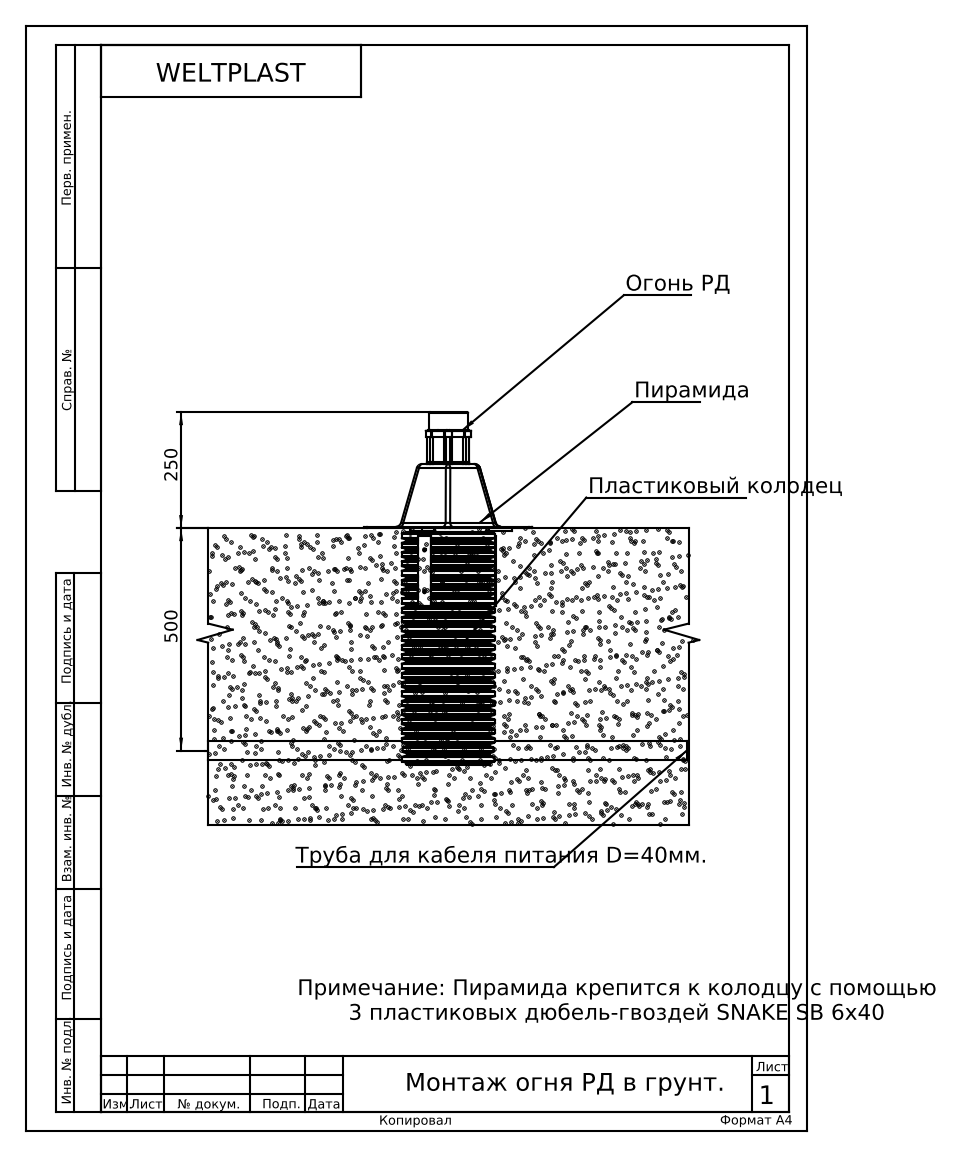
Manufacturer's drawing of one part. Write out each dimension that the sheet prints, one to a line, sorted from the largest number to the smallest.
500
250
